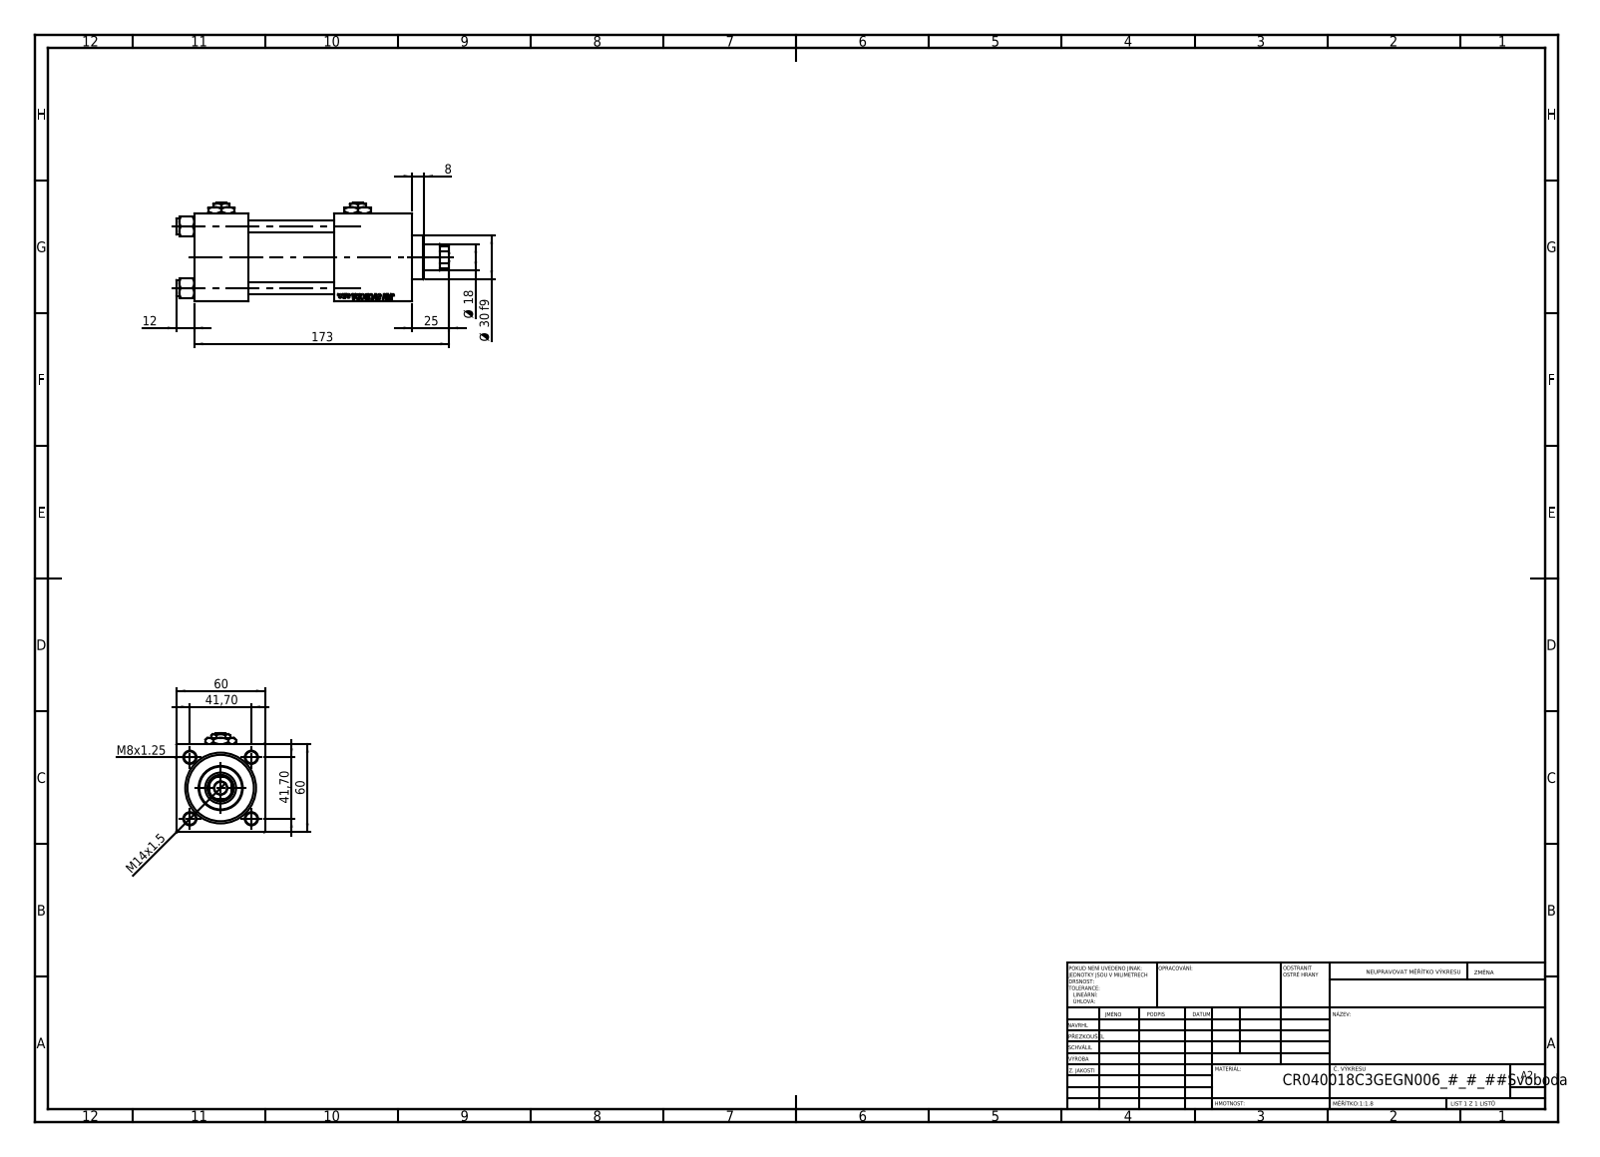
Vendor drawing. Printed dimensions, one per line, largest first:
173
60
60
41,70
41,70
Ø 30 f9
25
Ø 18
M14x1.5
12
8
M8x1.25
